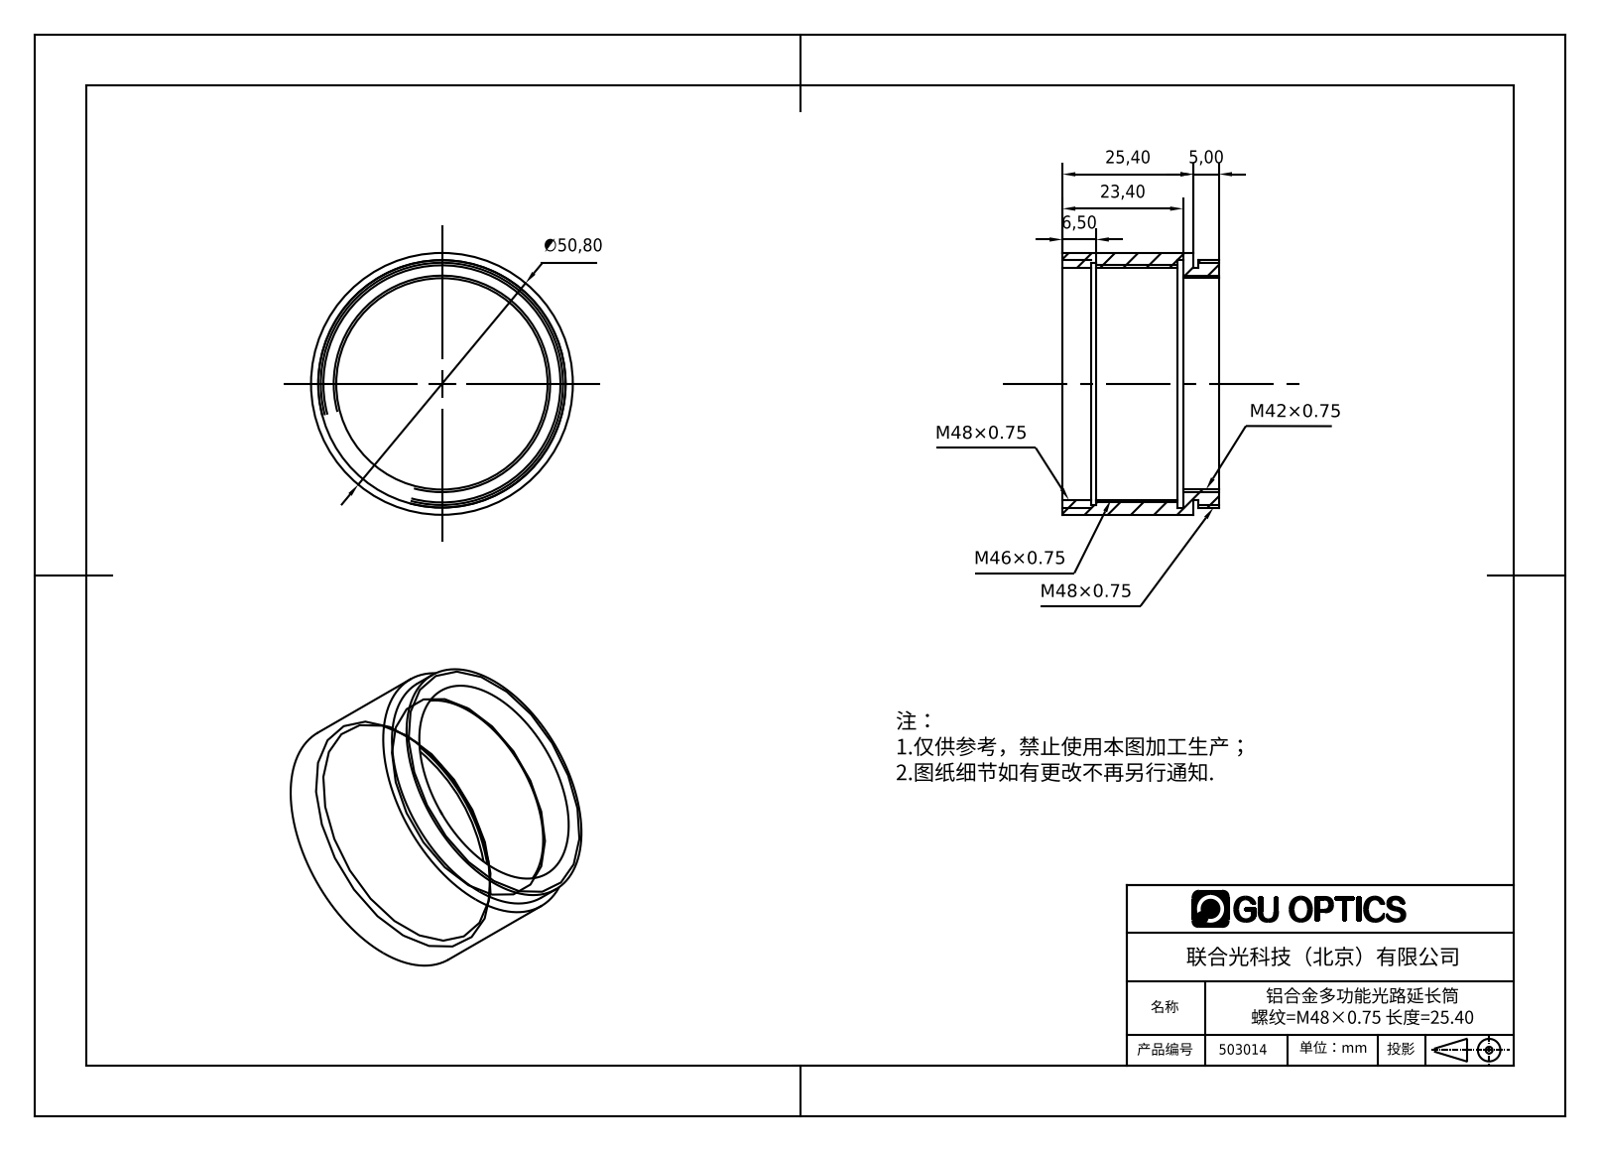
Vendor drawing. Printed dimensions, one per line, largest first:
∅50,80
25,40
23,40
6,50
5,00
